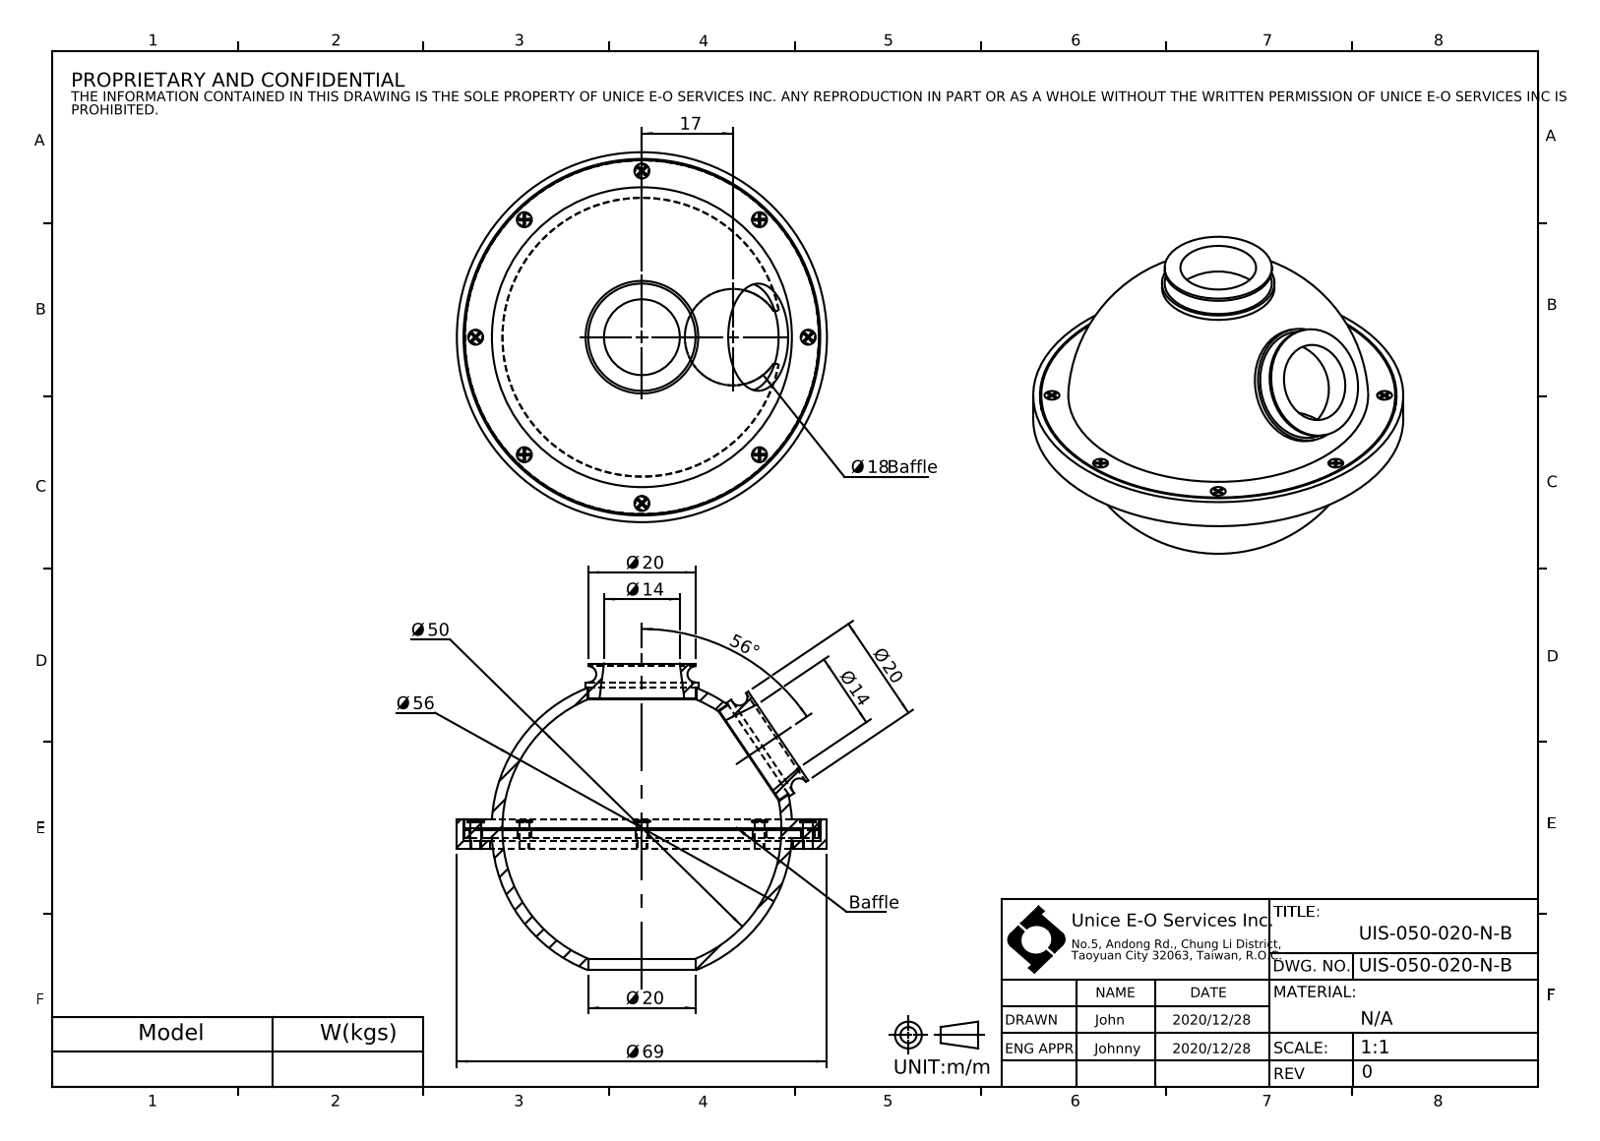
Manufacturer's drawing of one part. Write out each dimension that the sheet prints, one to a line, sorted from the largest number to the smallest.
Ø 69
56°
Ø 56
Ø 50
Ø 20
Ø 20
Ø 20
Ø 18 Baffle
17
Ø 14
Ø 14
